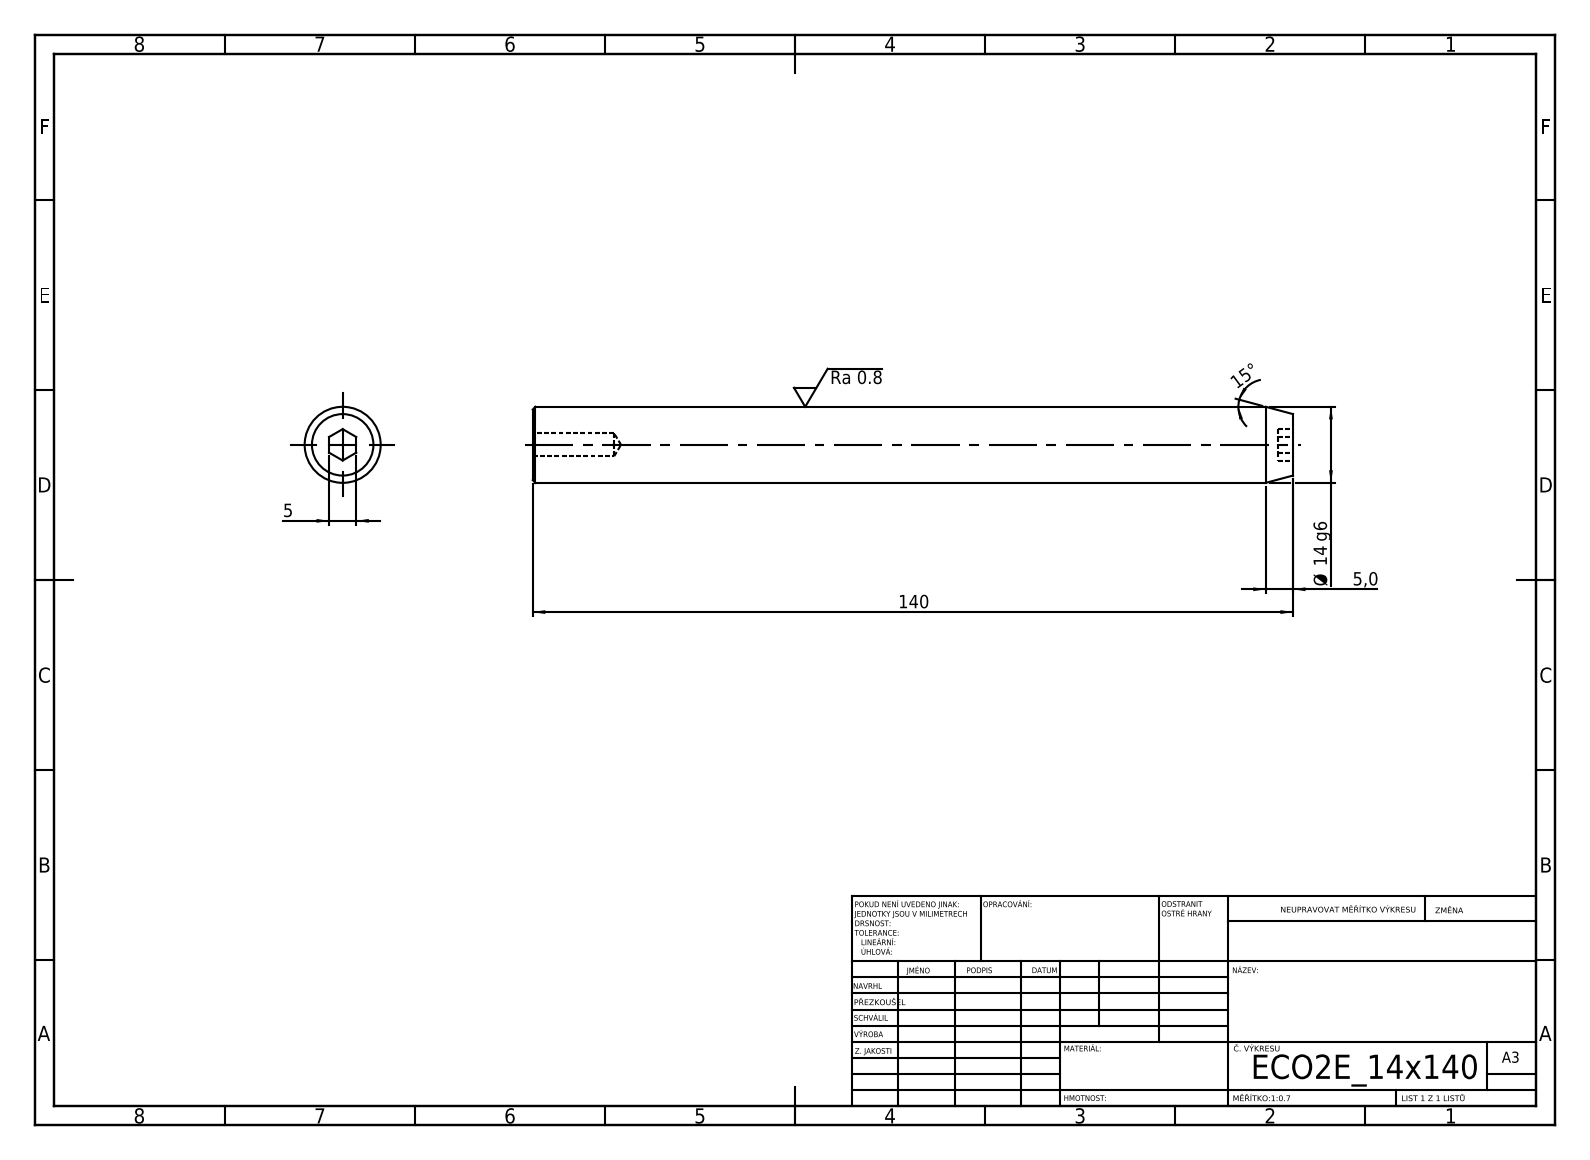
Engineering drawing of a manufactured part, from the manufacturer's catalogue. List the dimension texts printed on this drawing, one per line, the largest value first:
140
15°
Ø 14 g6
5,0
5
